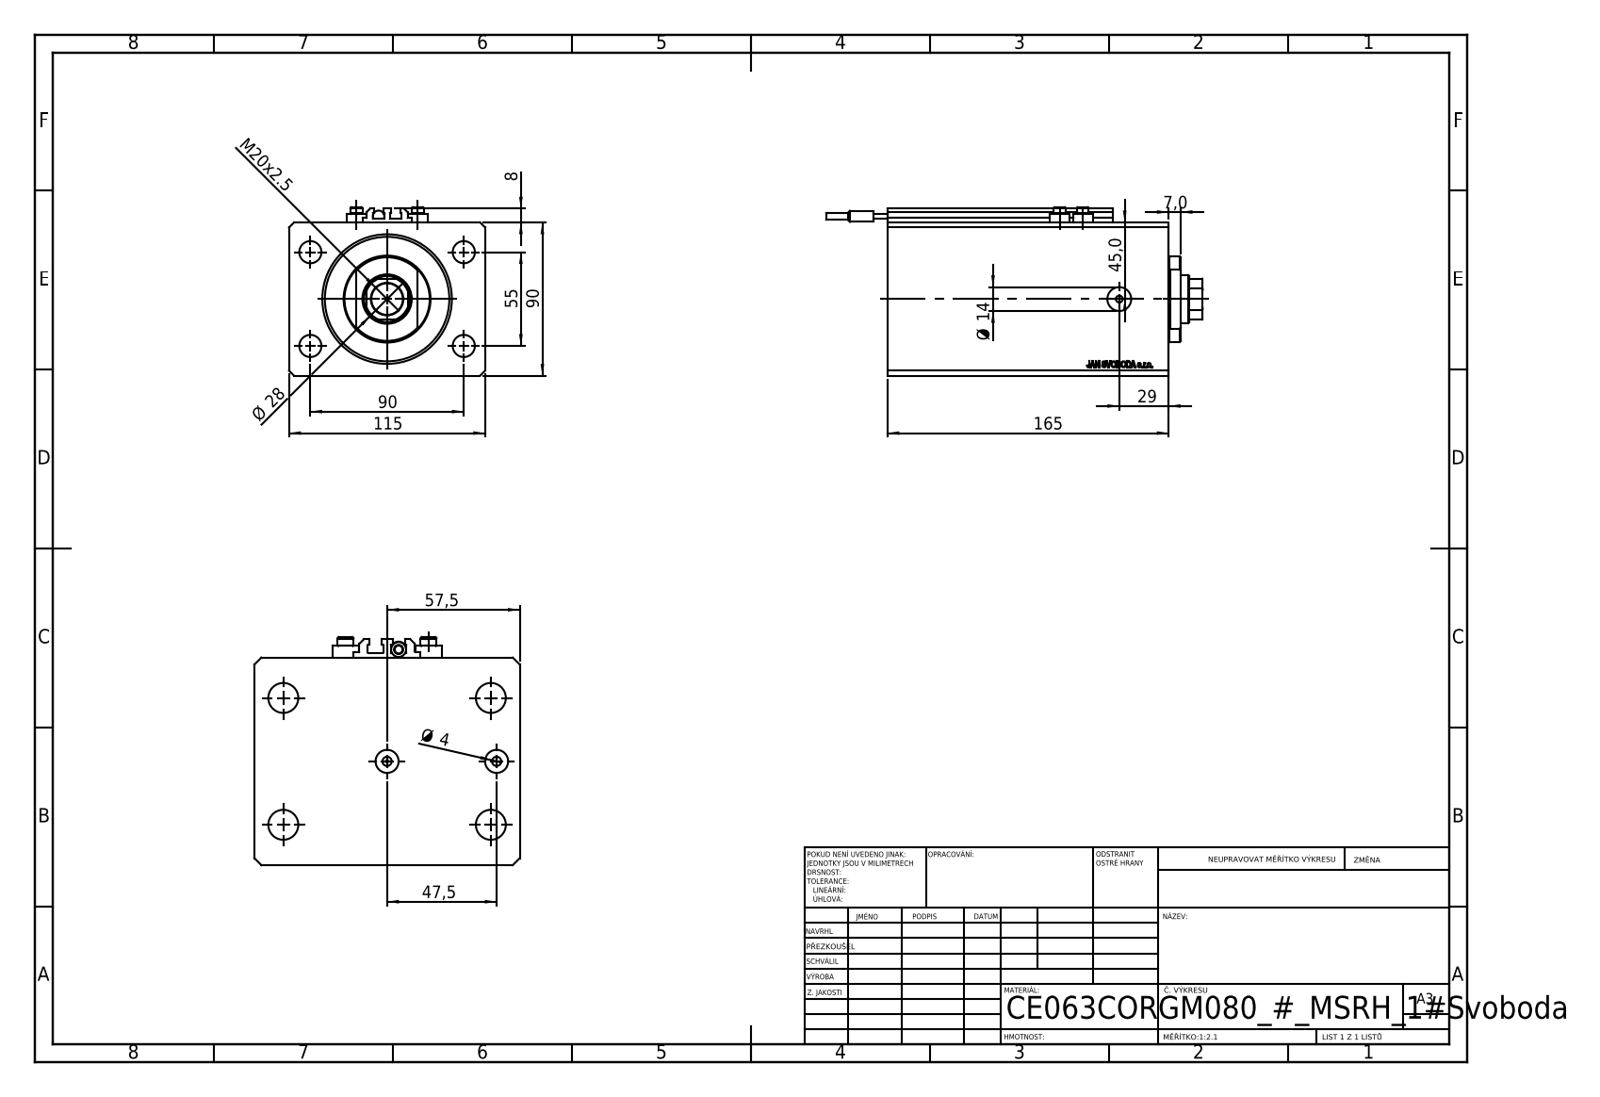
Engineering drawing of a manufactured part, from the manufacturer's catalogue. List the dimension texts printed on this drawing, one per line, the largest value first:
165
115
90
90
57,5
55
47,5
45,0
29
Ø 28
M20x2.5
Ø 14
8
7,0
Ø 4
